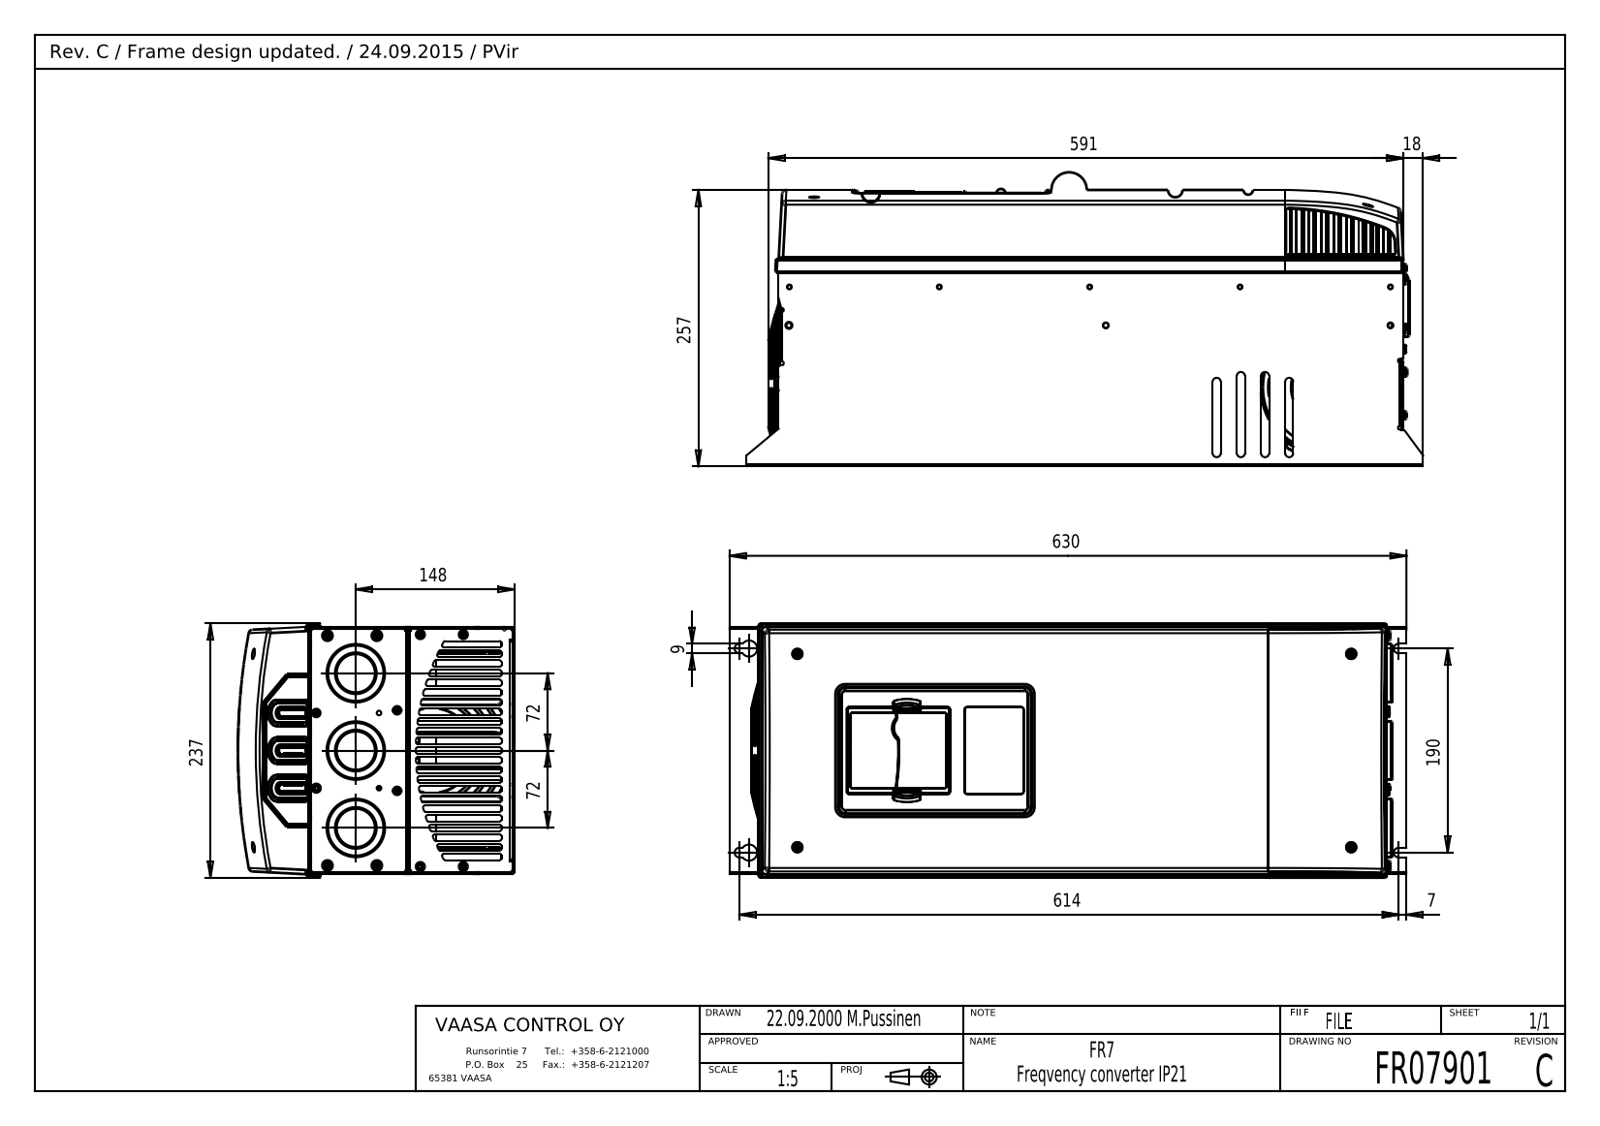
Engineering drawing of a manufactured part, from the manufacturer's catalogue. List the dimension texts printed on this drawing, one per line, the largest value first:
630
614
591
257
237
190
148
72
72
18
9
7
